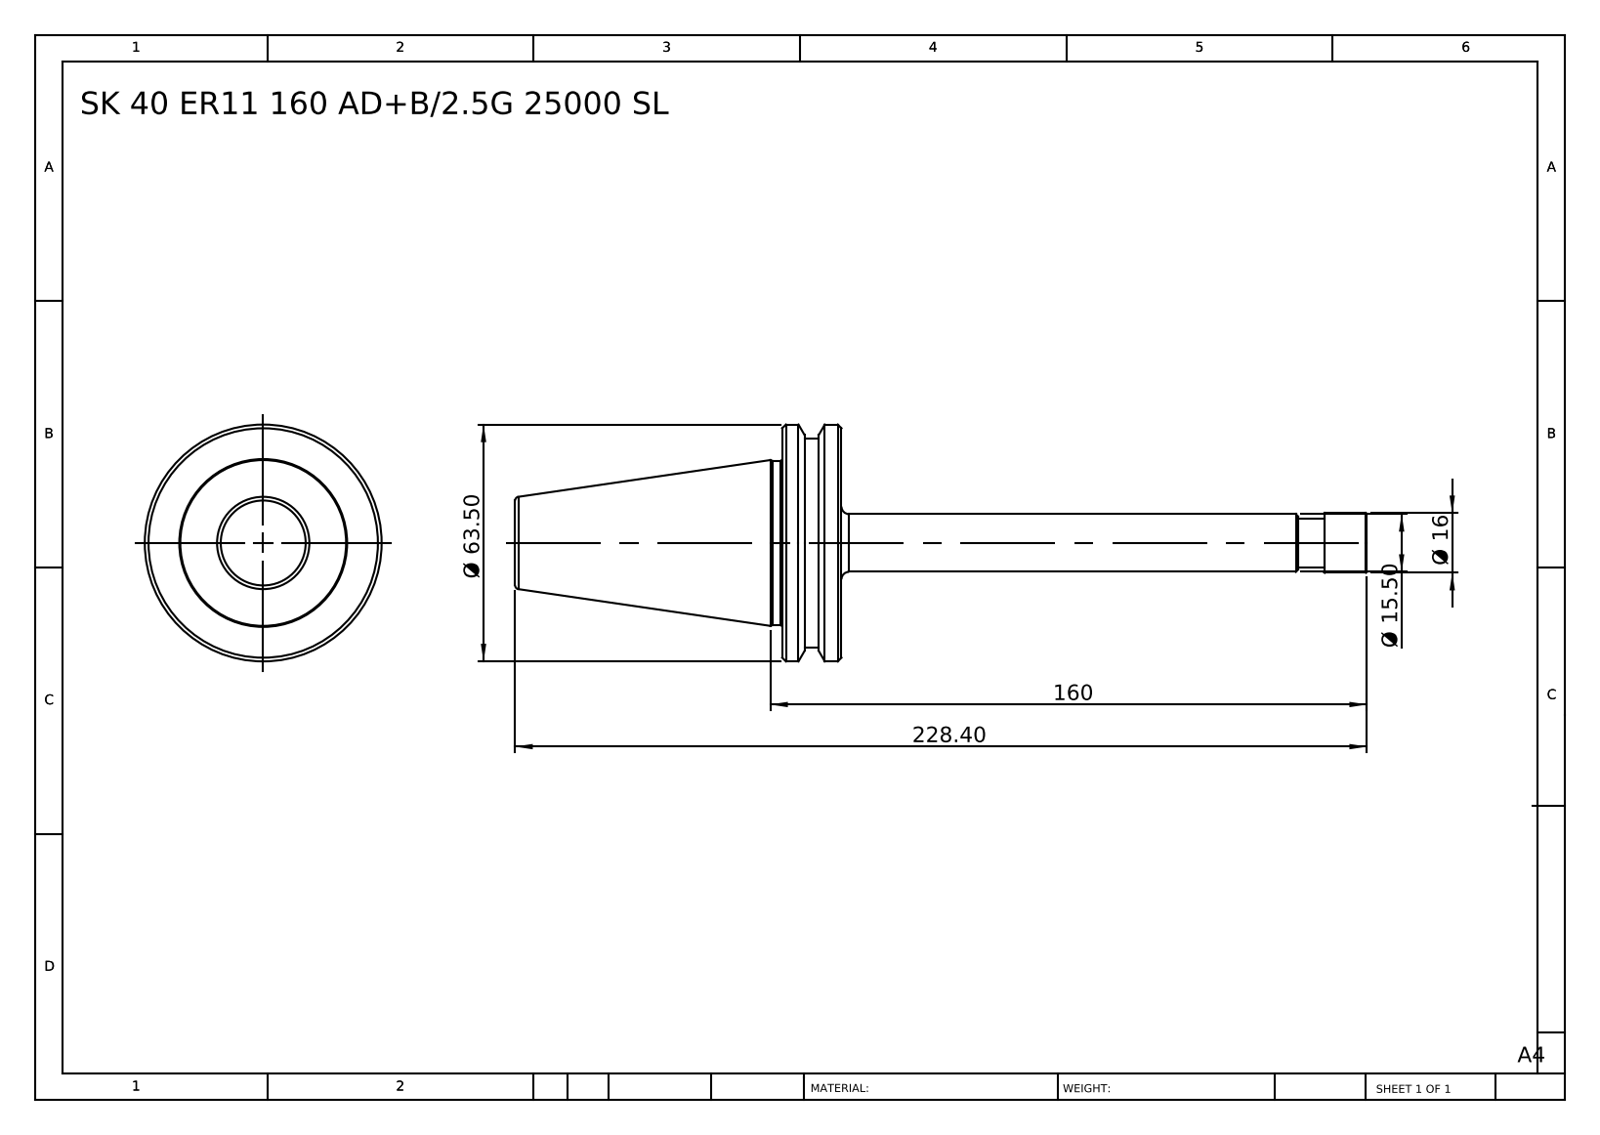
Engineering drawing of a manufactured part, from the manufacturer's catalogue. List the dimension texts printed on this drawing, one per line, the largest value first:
228.40
160
Ø 63.50
Ø 16
Ø 15.50
